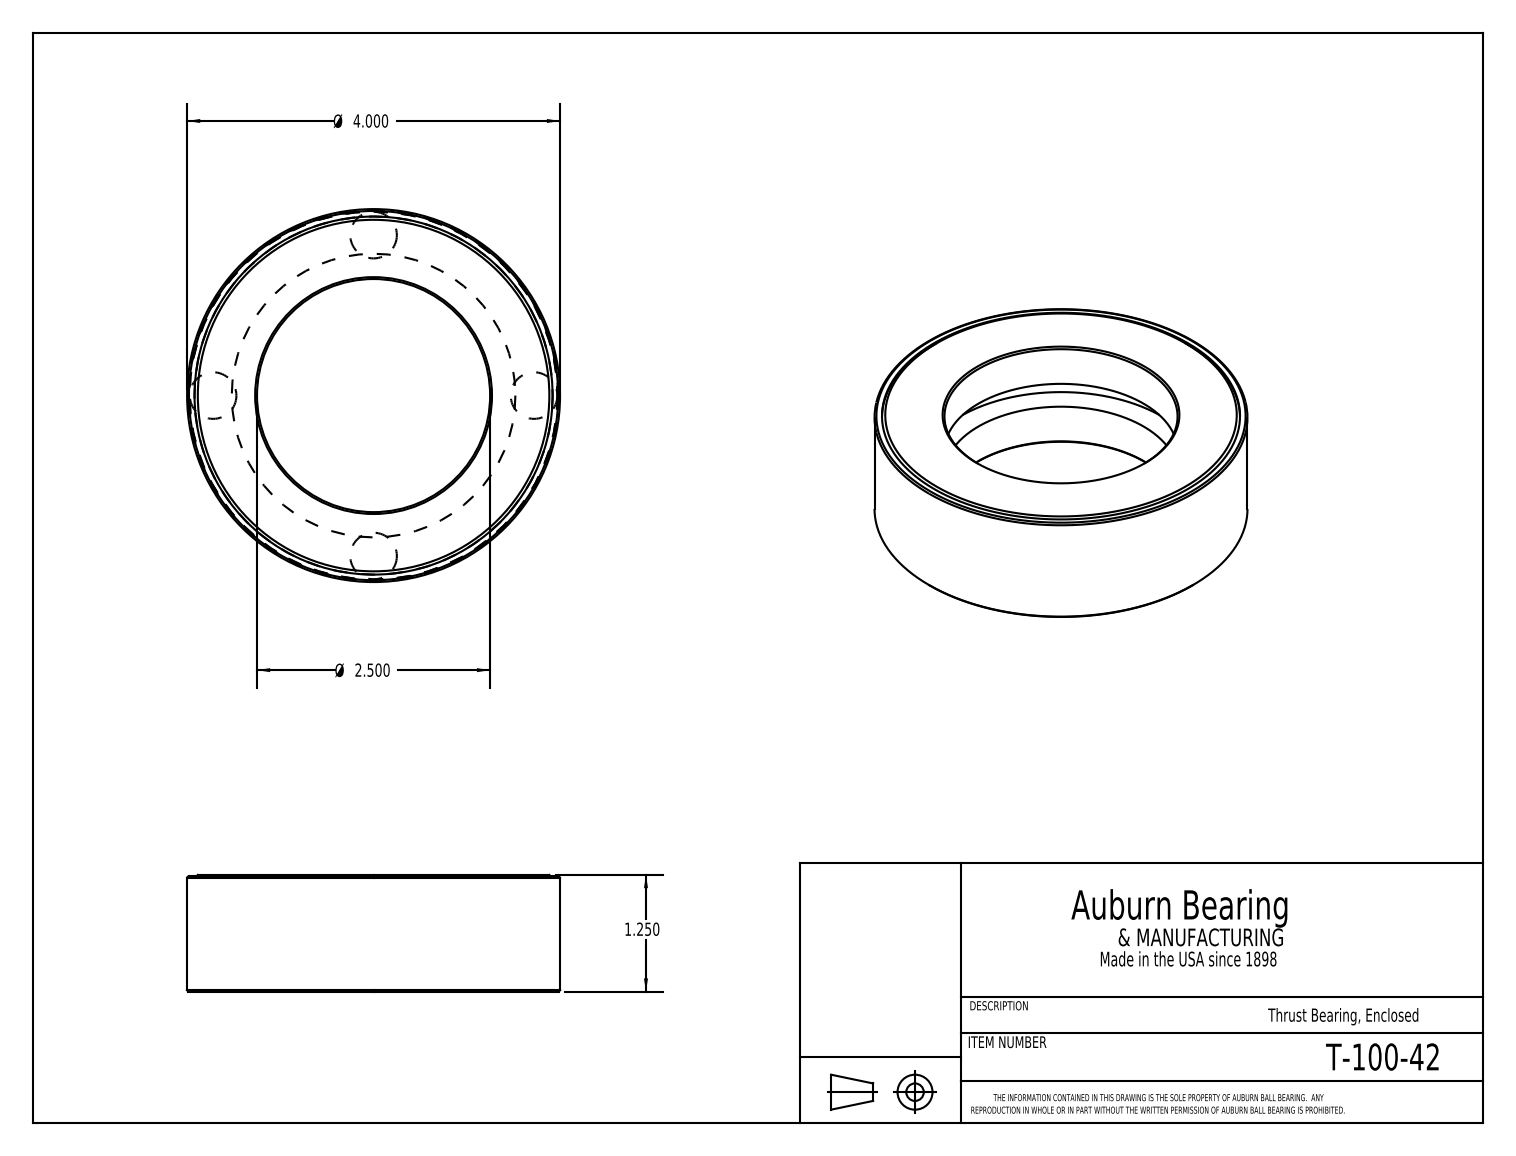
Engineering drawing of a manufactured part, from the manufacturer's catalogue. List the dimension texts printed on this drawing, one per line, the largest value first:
Ø 4.000
Ø 2.500
1.250
